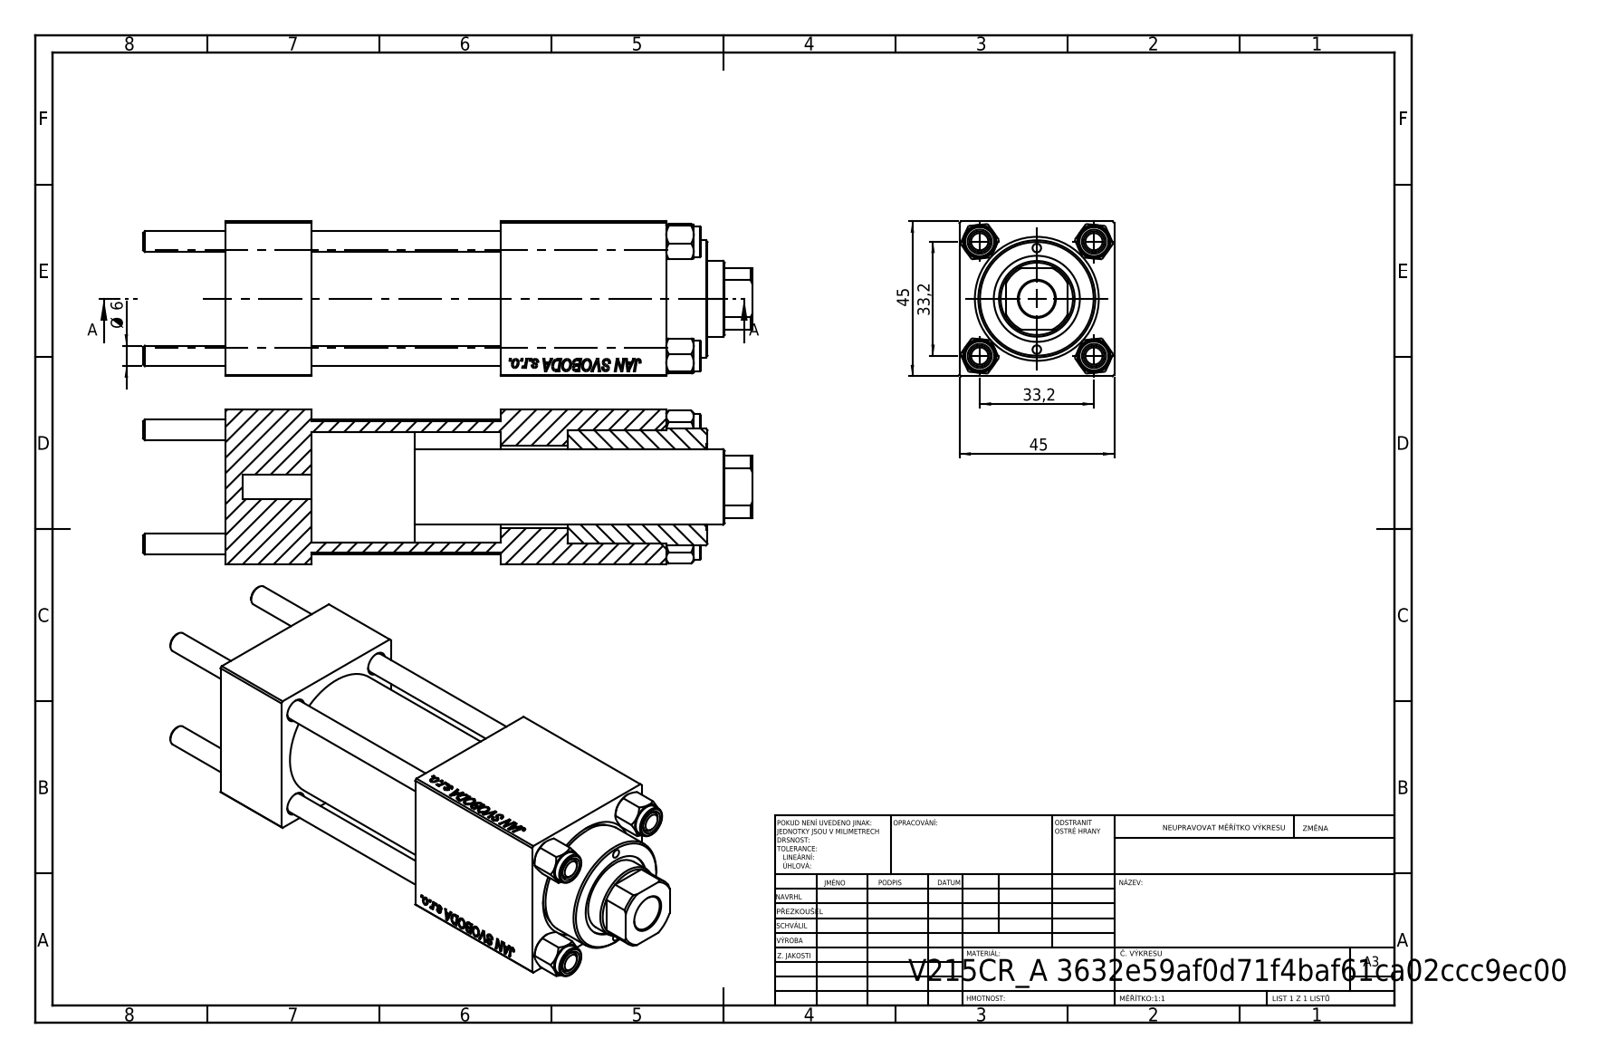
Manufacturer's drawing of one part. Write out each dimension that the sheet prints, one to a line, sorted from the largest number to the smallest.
45
45
33,2
33,2
Ø 6
